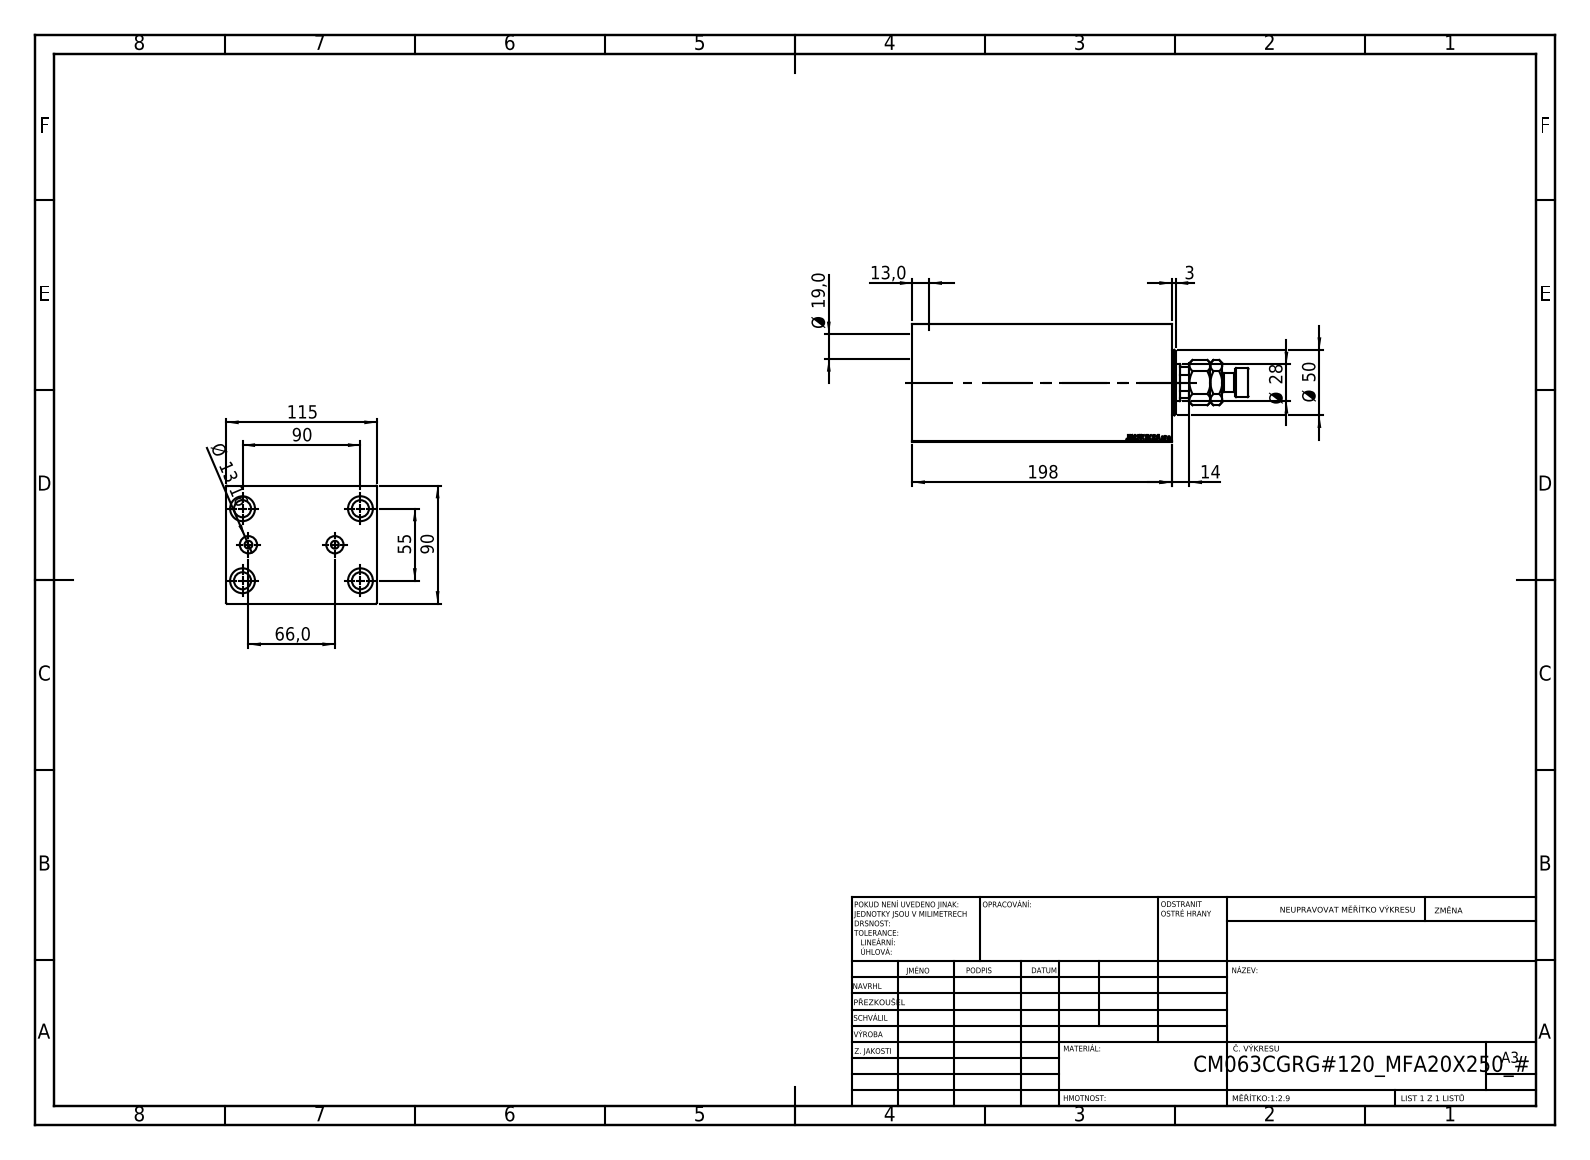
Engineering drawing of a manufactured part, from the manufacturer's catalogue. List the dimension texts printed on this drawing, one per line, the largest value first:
198
115
90
90
66,0
55
Ø 50
Ø 28
Ø 19,0
14
Ø 13,16
13,0
3
